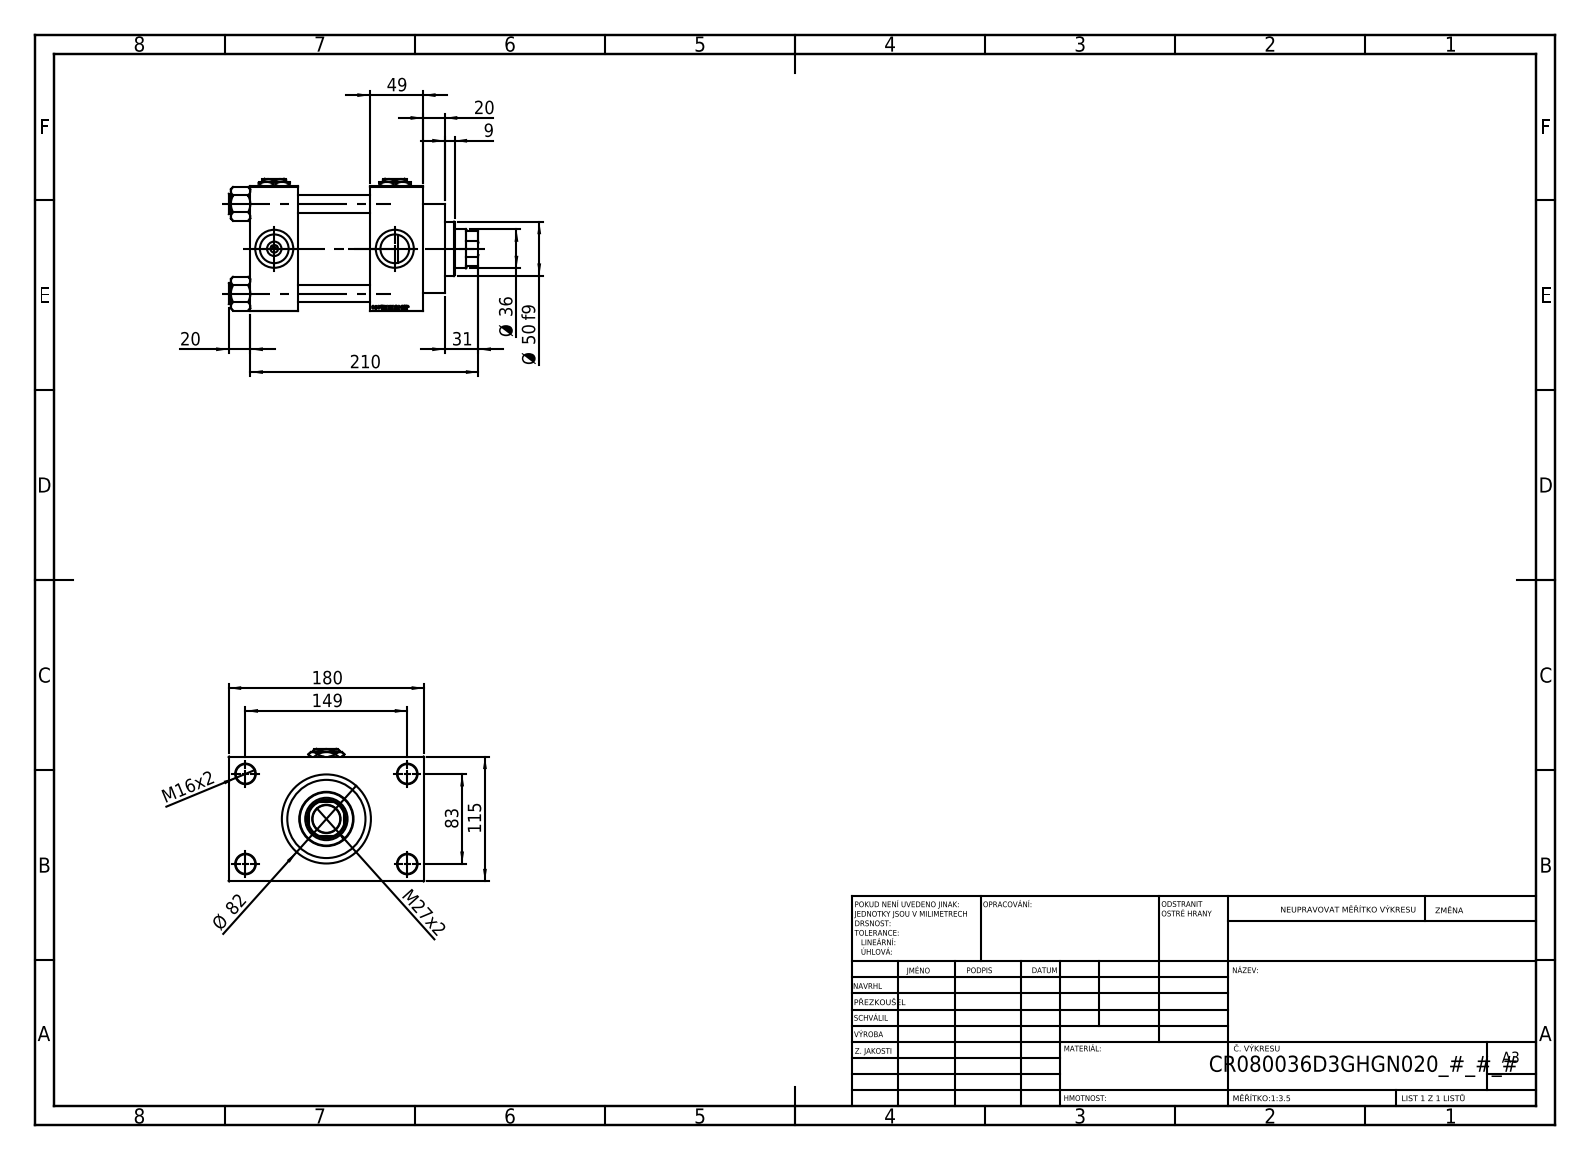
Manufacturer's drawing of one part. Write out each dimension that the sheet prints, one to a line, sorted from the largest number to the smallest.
210
180
149
115
83
Ø 82
Ø 50 f9
49
Ø 36
31
M27x2
20
20
M16x2
9
